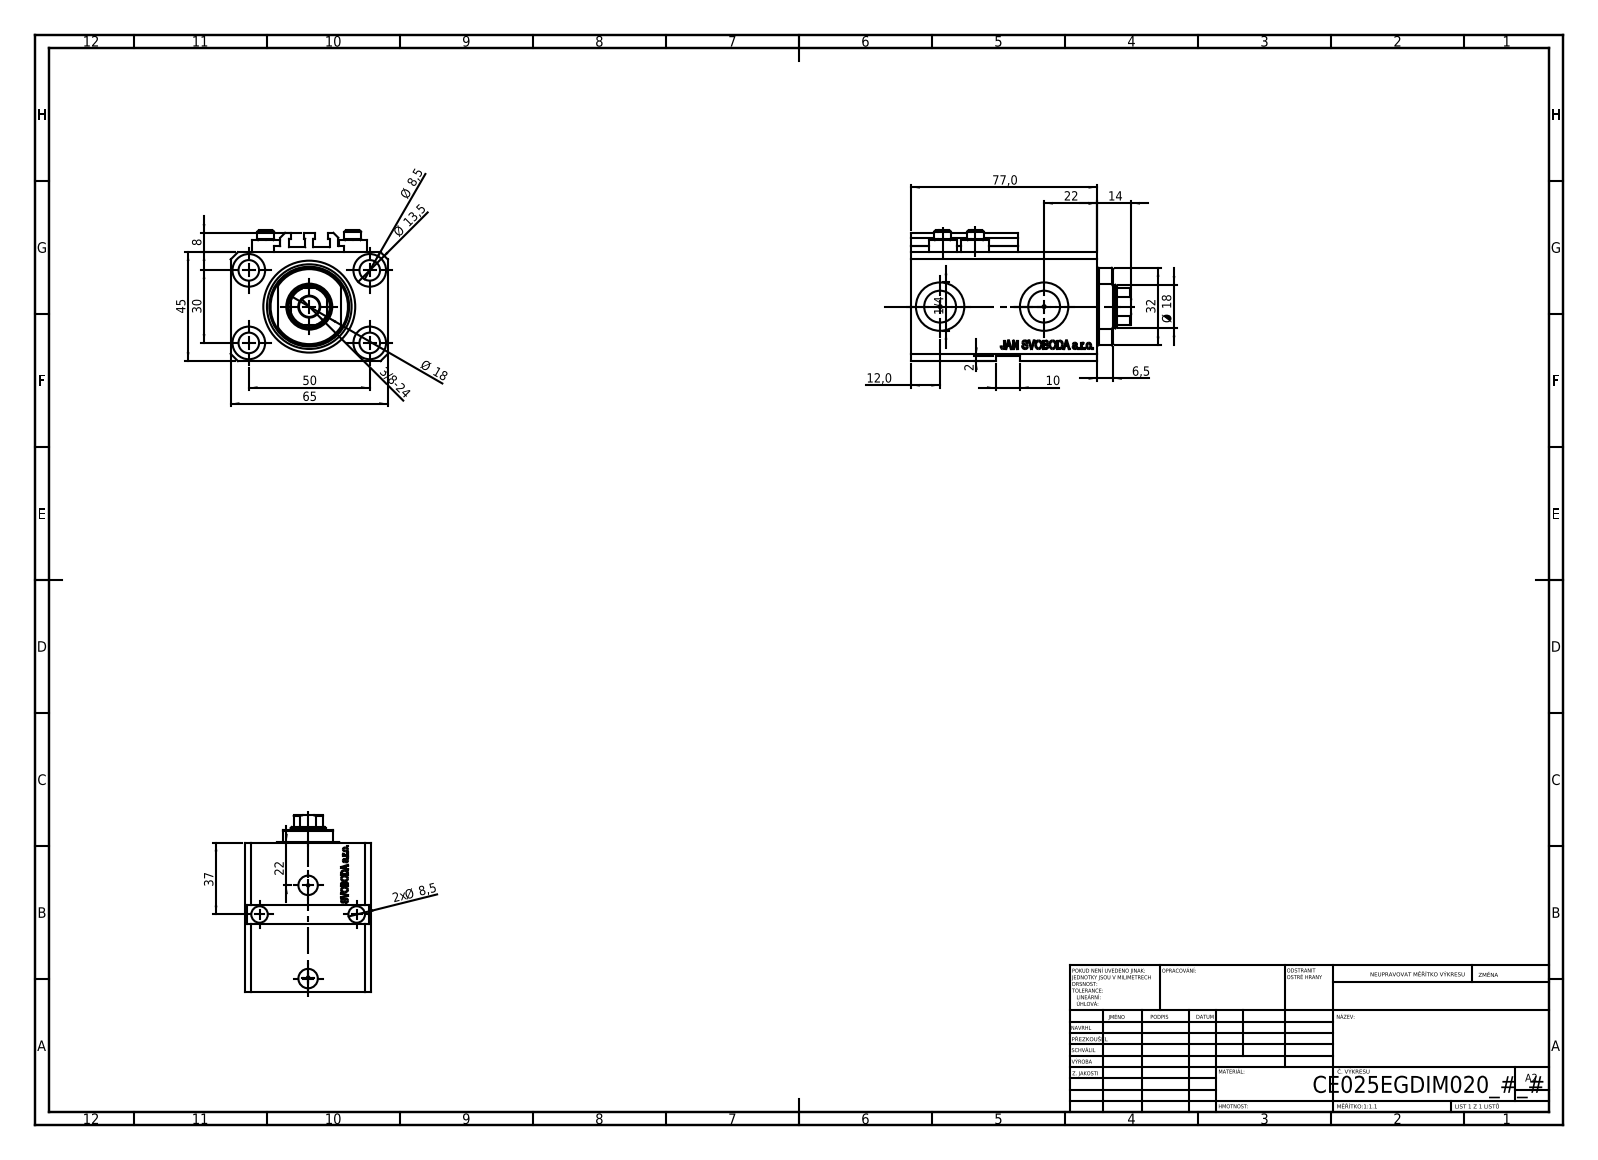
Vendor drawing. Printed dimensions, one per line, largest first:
77,0
65
50
45
37
32
30
22
22
Ø 18
Ø 18
14
Ø 13,5
12,0
10
Ø 8,5
2x Ø 8,5
8
6,5
2
3/8-24
1/4
